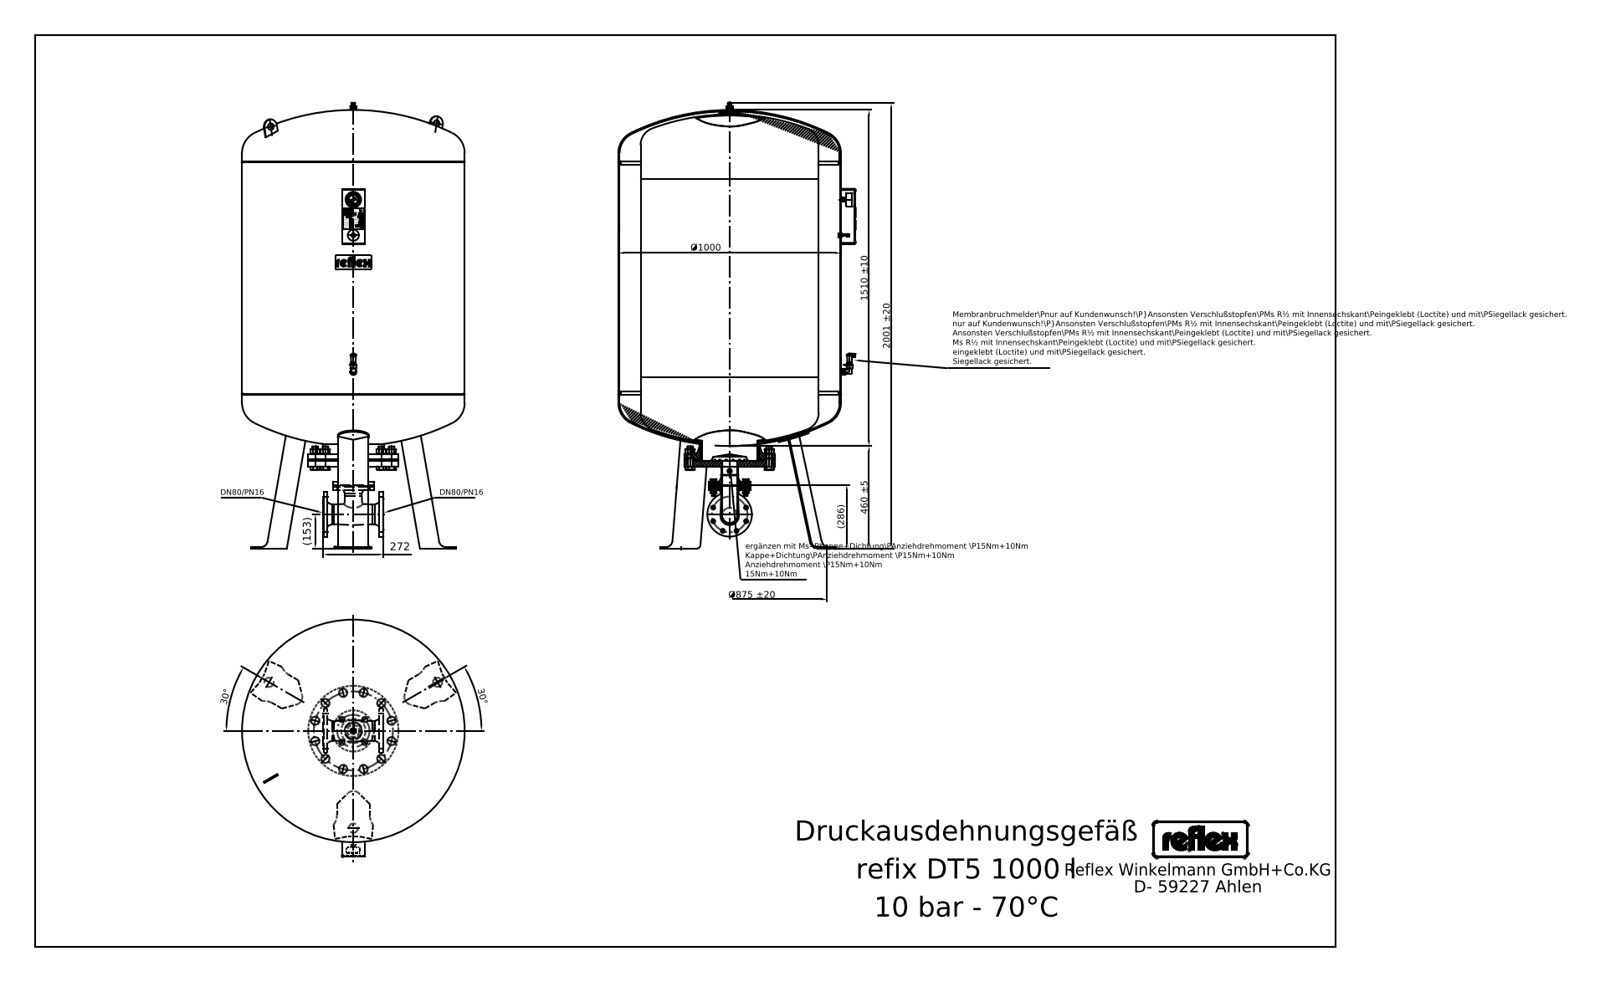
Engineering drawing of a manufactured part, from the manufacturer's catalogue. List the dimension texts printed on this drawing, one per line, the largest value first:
2001 ±20
1510 ±10
Ø1000
Ø875 ±20
460 ±5
(286)
272
(153)
30°
30°
